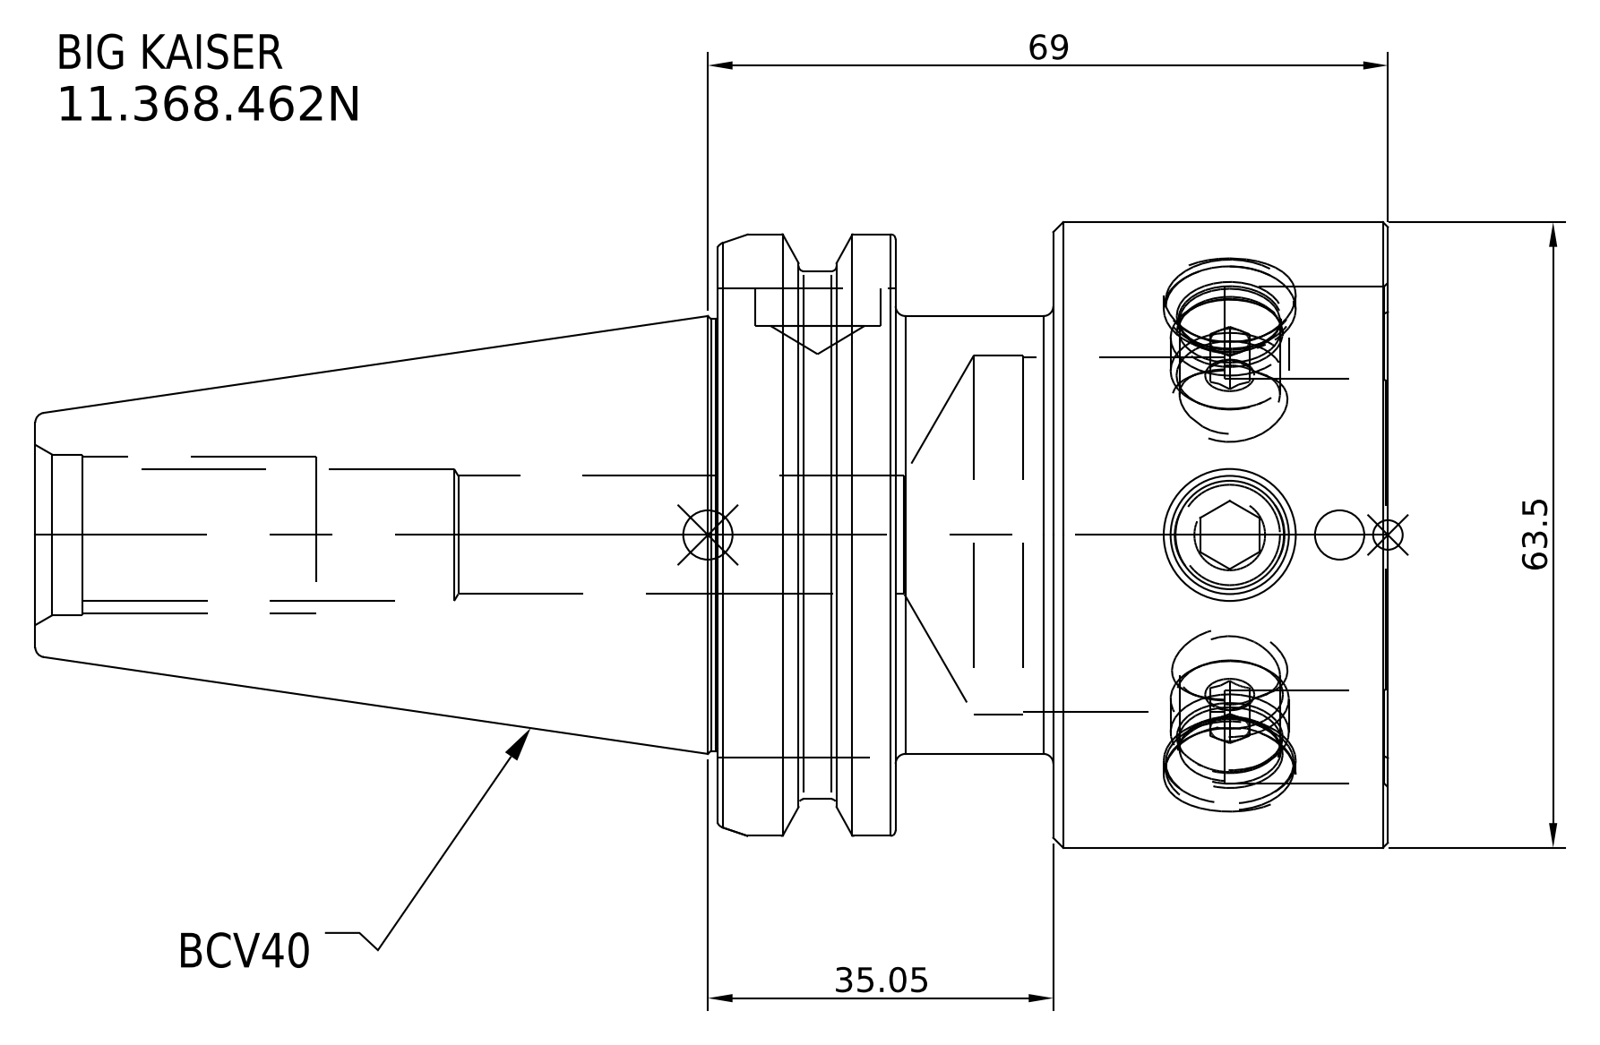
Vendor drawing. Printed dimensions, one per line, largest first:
69
63.5
35.05
